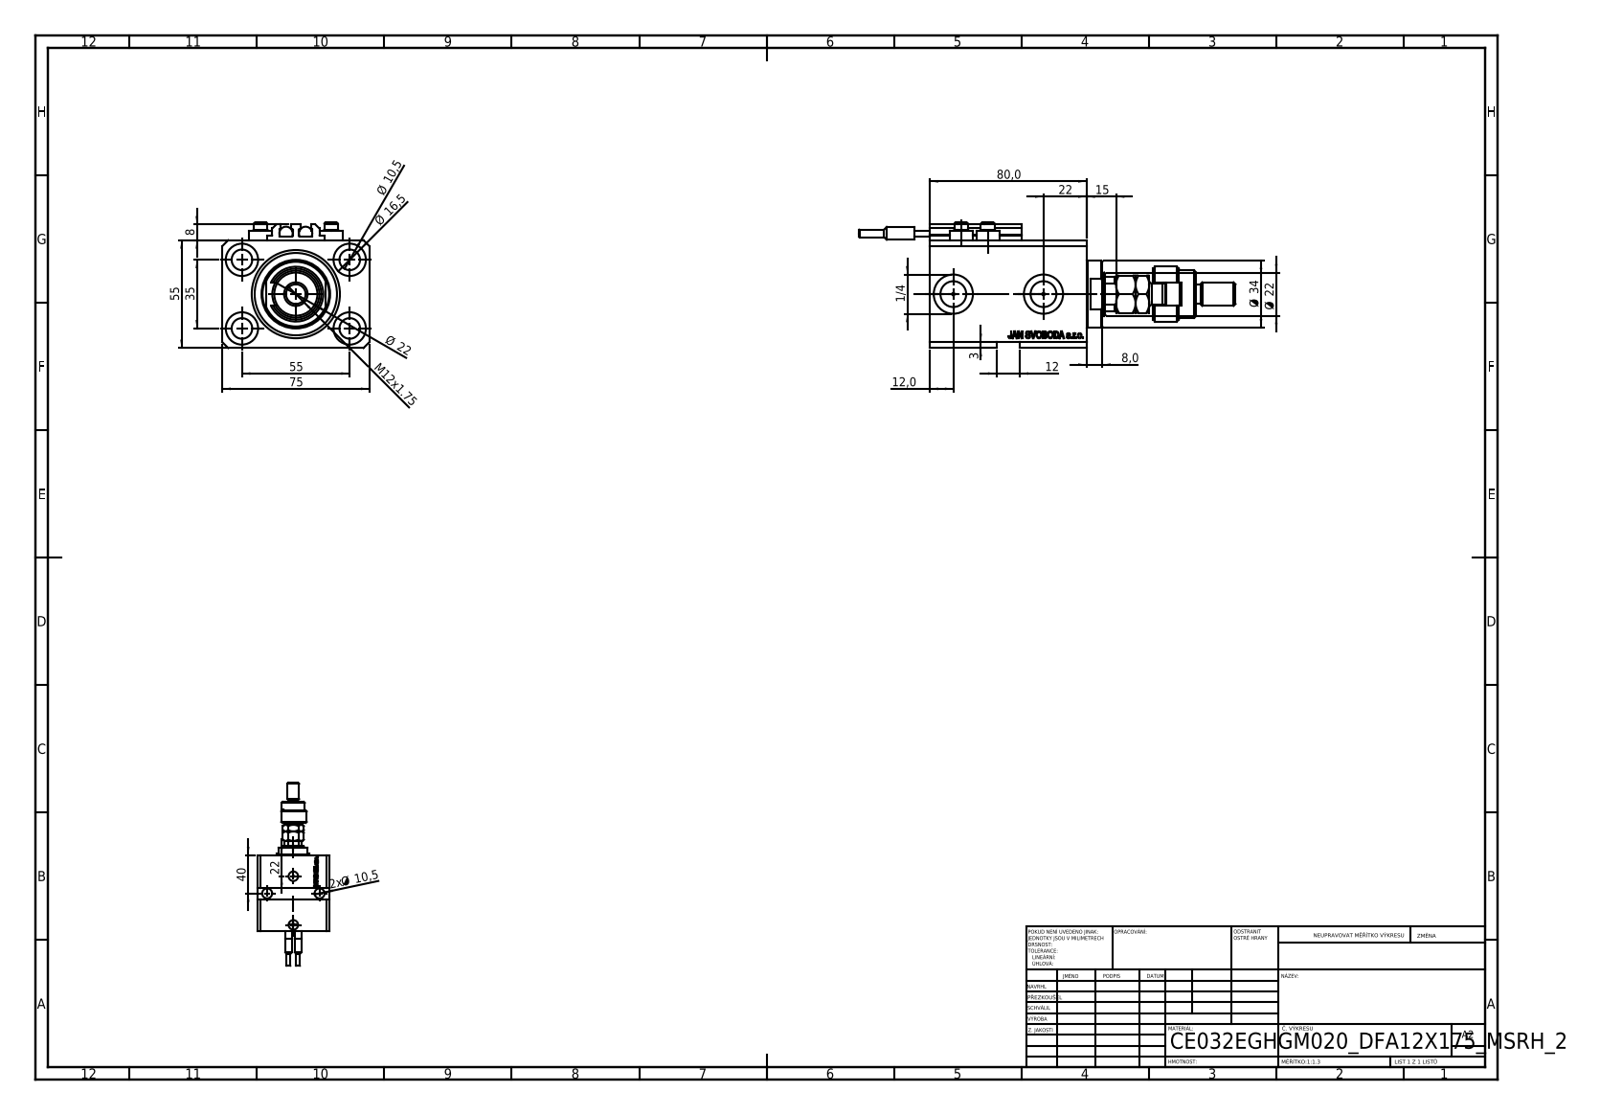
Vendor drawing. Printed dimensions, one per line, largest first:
80,0
75
55
55
40
35
Ø 34
Ø 22
22
Ø 22
22
Ø 16,5
15
M12x1.75
12,0
12
Ø 10,5
2x Ø 10,5
8
8,0
3
1/4
